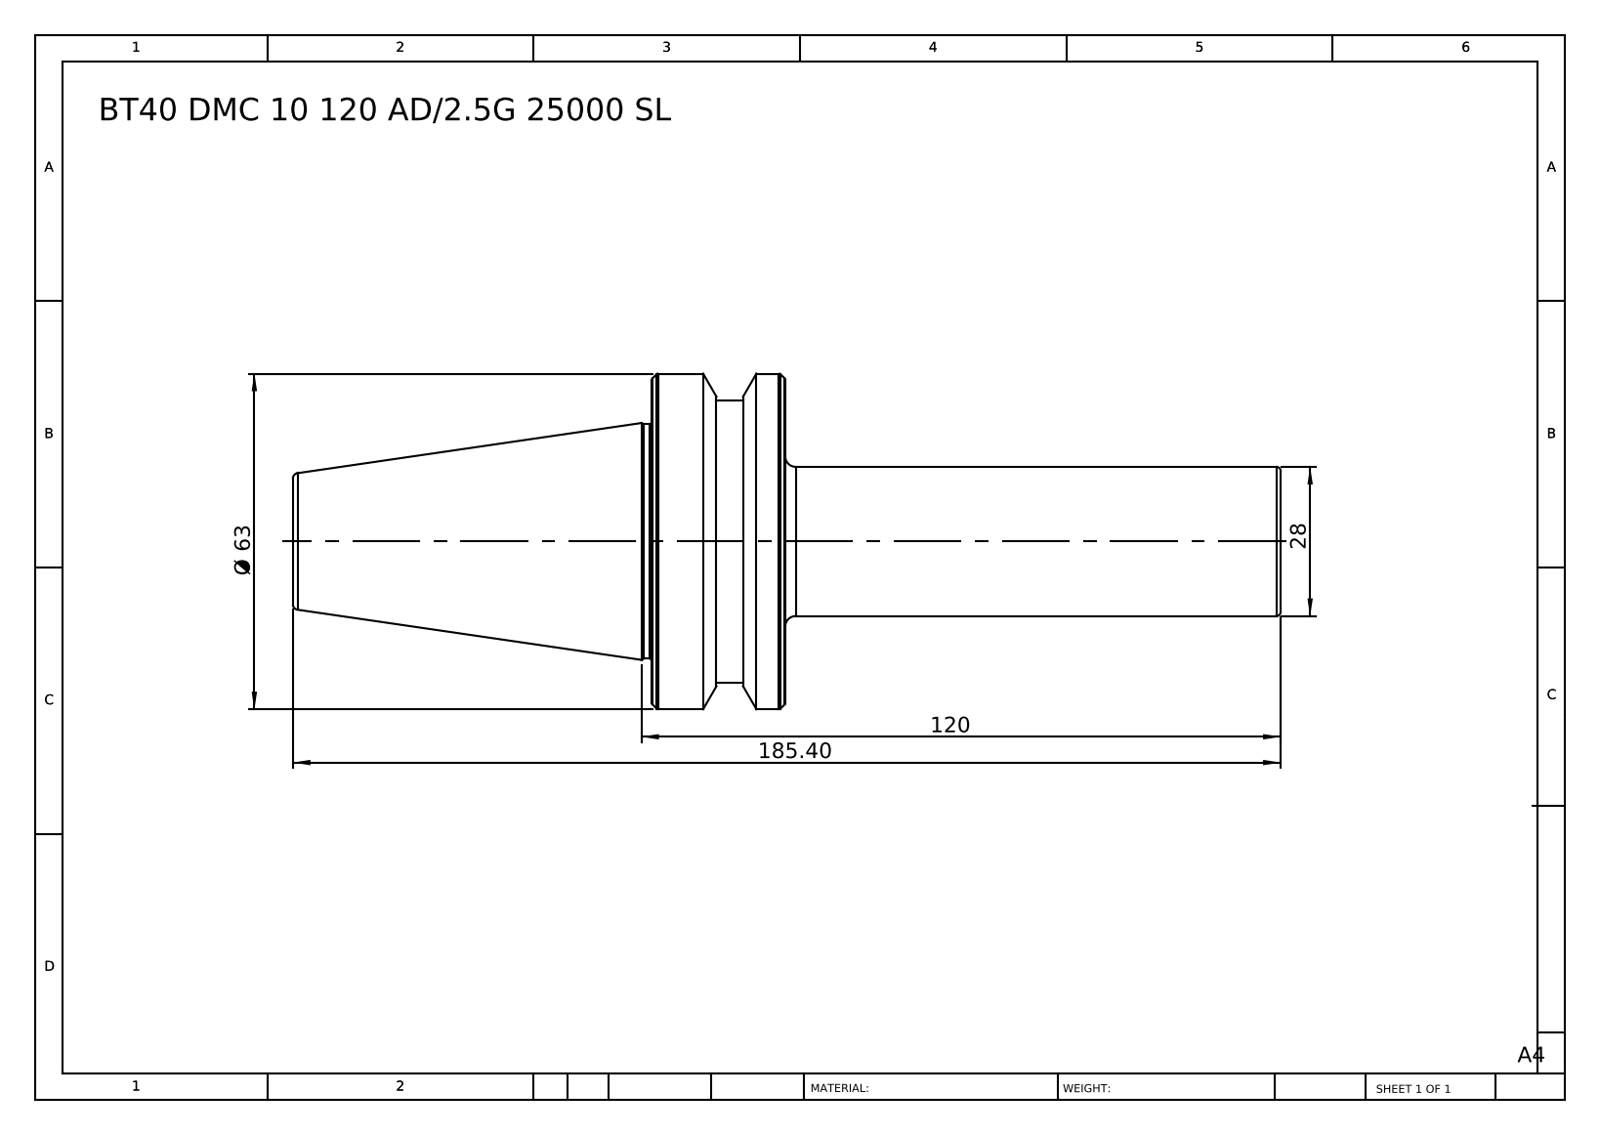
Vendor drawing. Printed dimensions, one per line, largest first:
185.40
120
Ø 63
28
